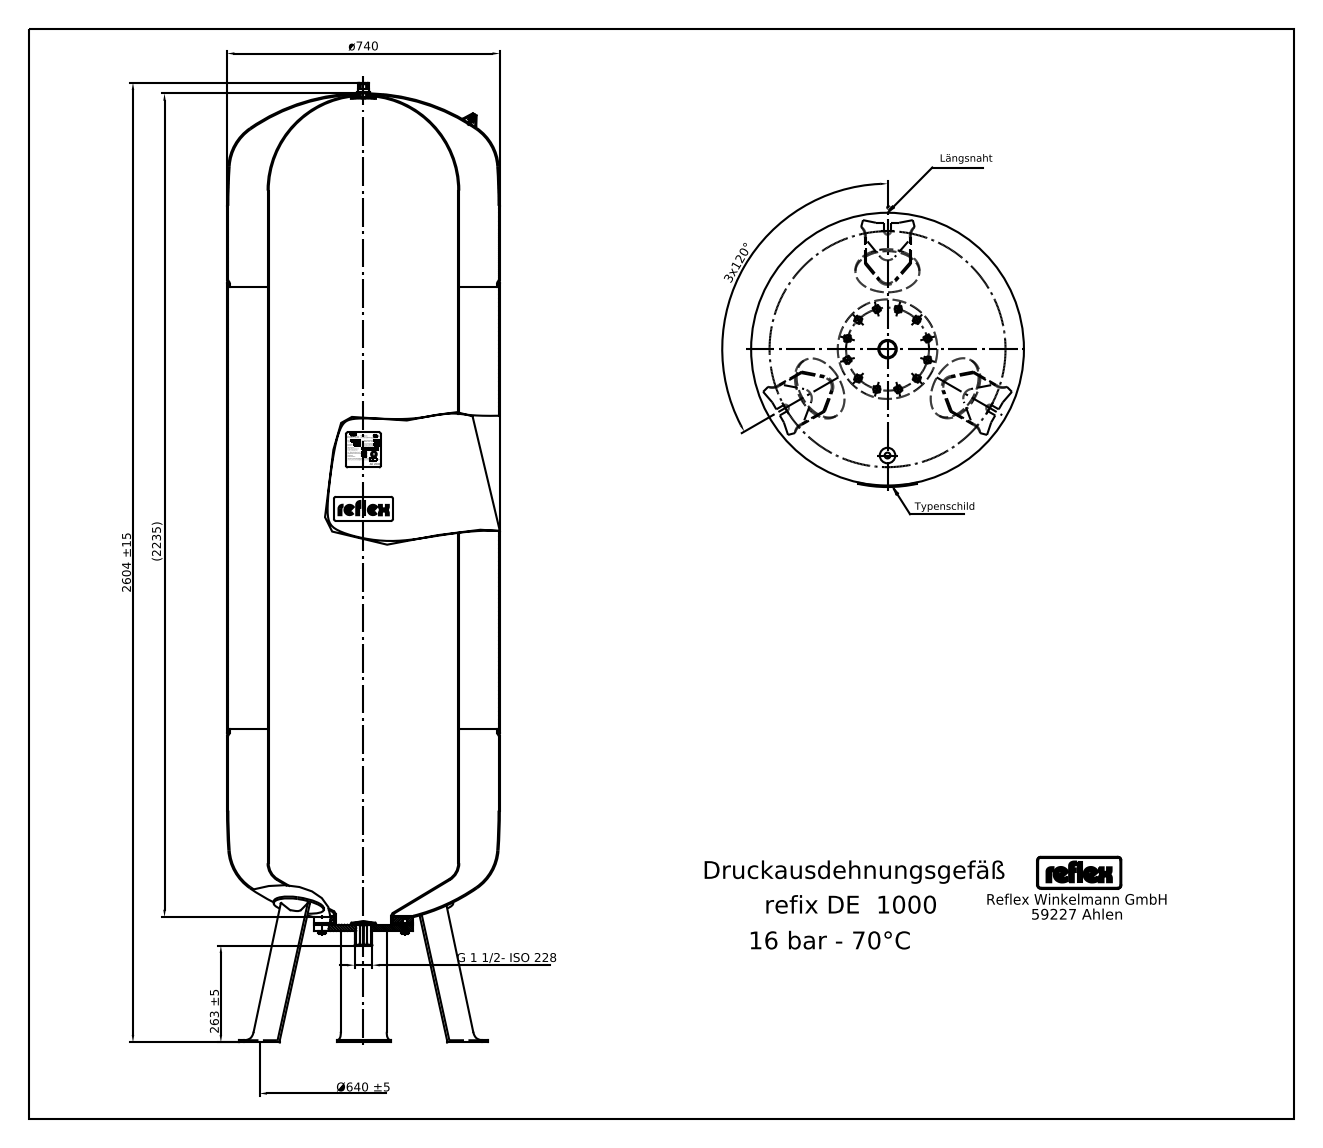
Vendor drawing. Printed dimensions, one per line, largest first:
2604 ±15
(2235)
ø740
Ø640 ±5
263 ±5
3x120°
G 1 1/2- ISO 228
